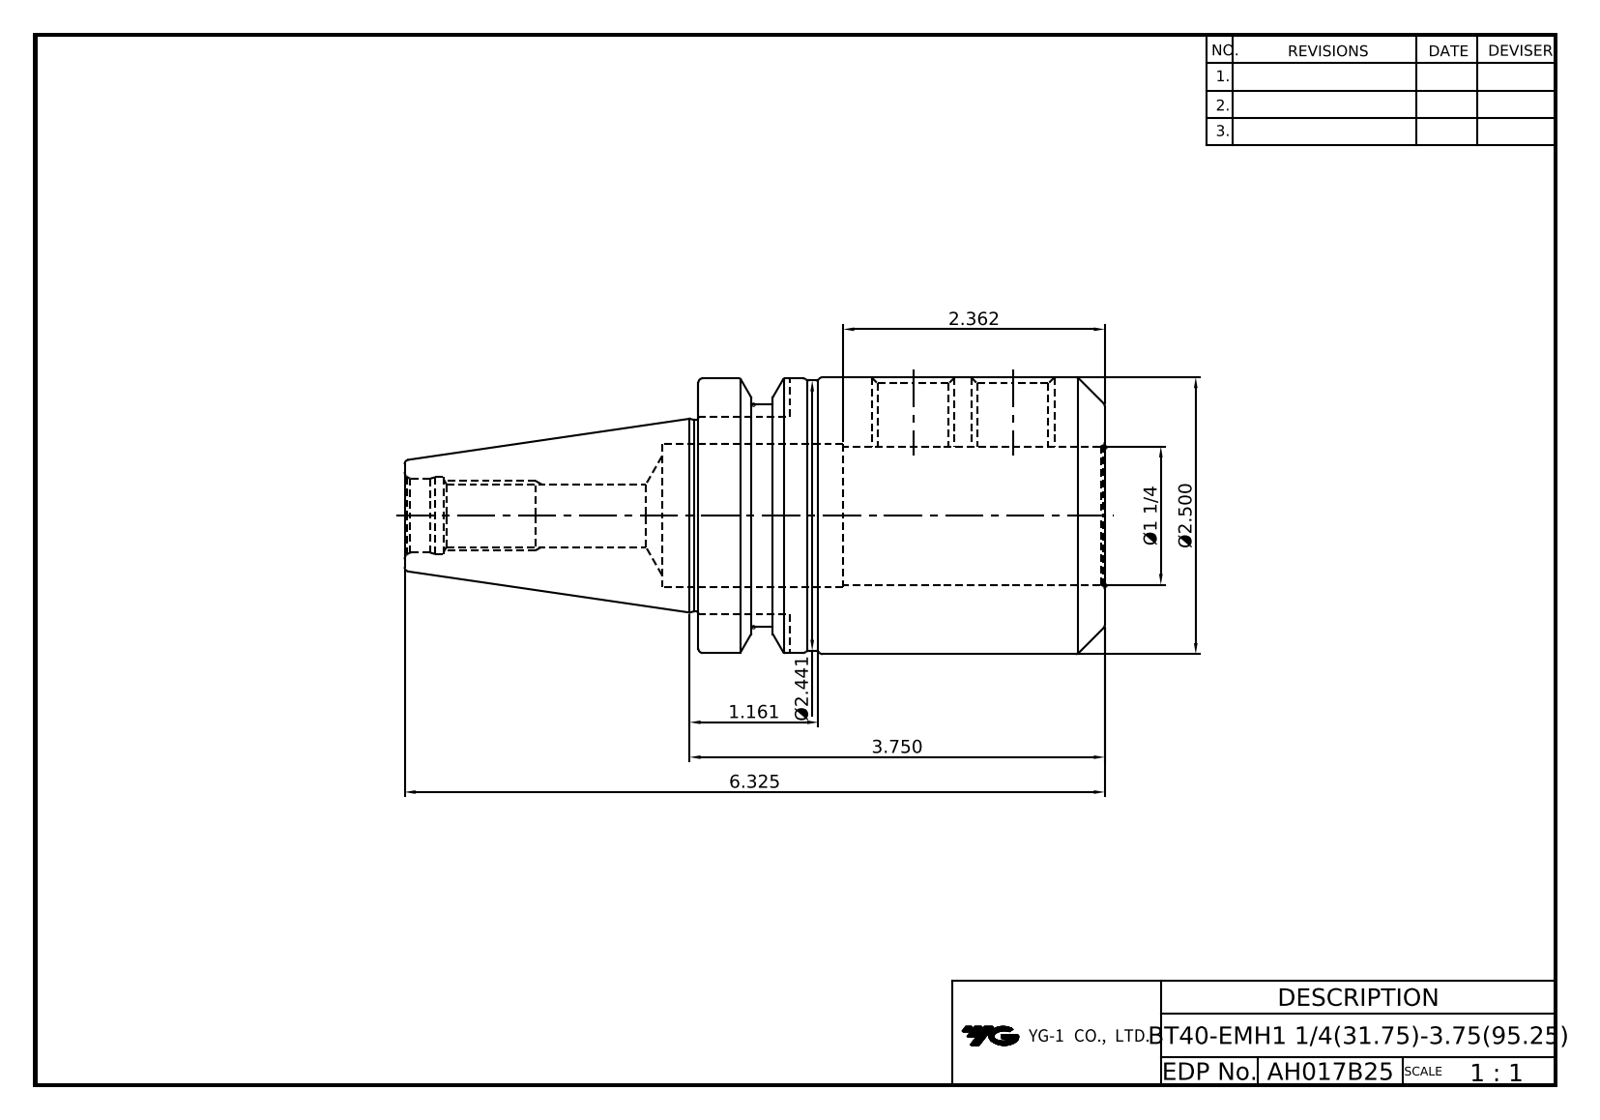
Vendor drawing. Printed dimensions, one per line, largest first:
6.325
3.750
Ø2.500
Ø2.441
2.362
Ø1 1/4
1.161
